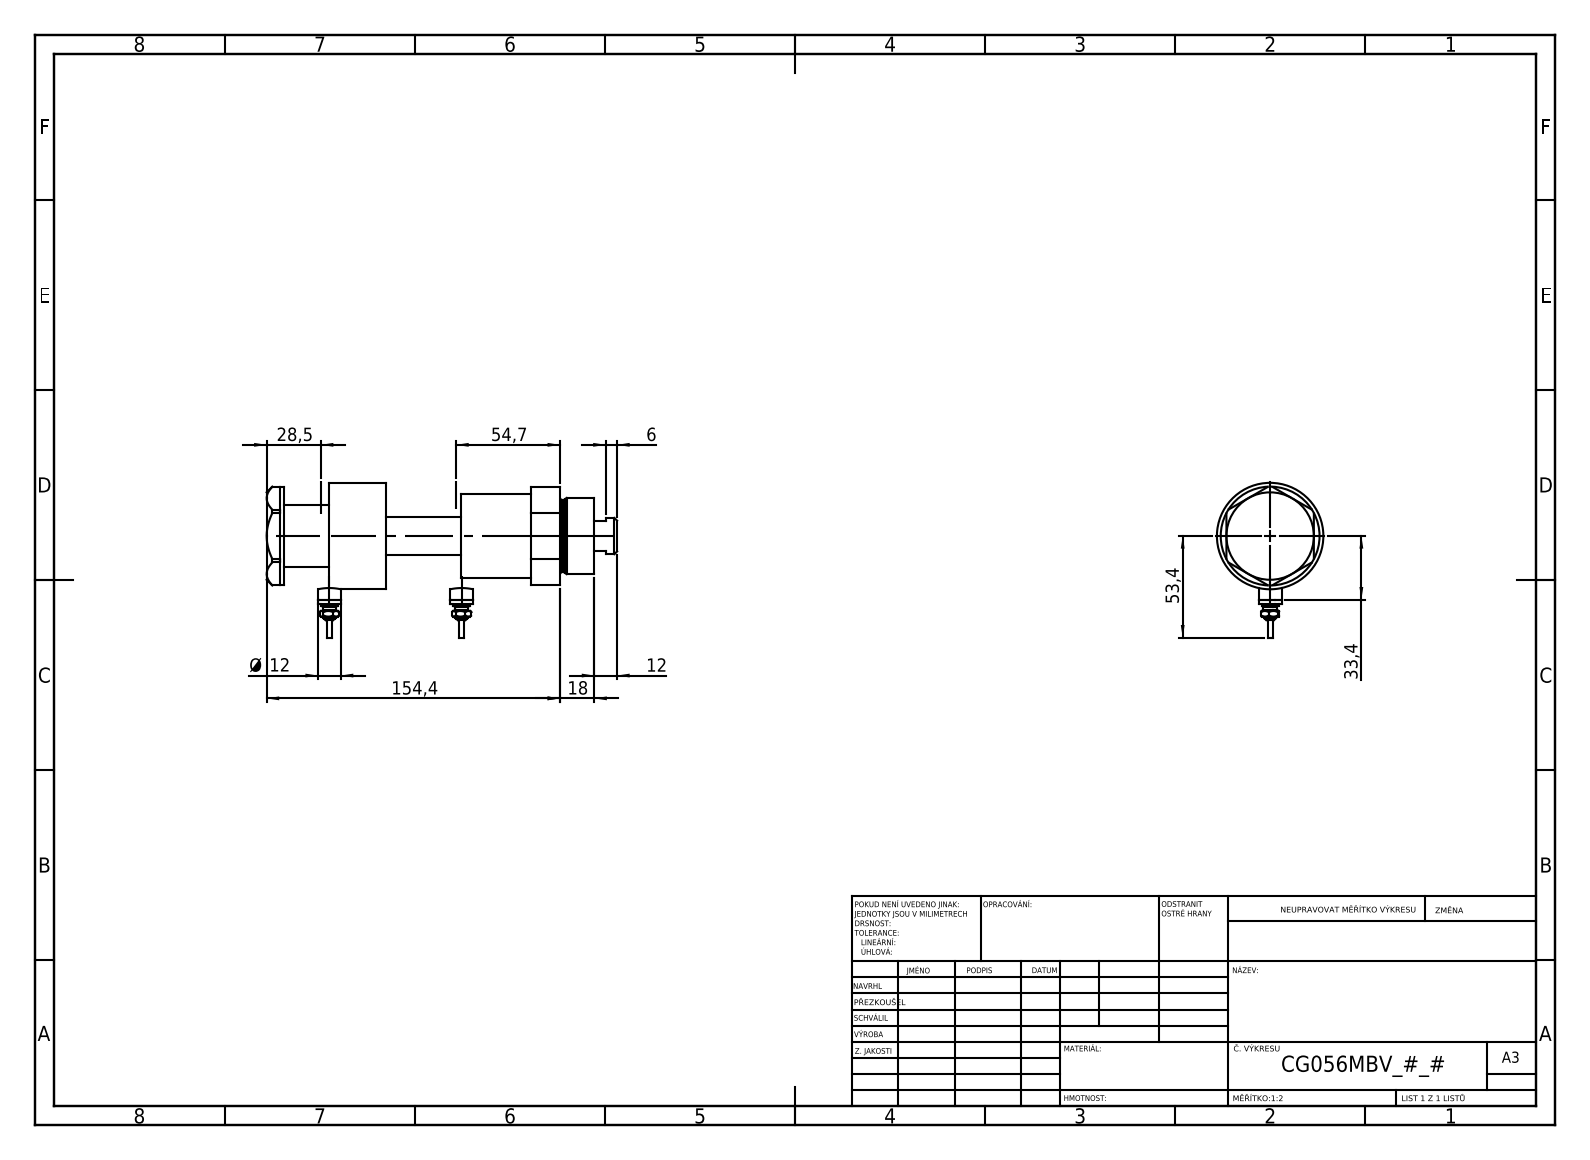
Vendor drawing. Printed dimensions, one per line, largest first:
154,4
54,7
53,4
33,4
28,5
18
12
Ø 12
6
